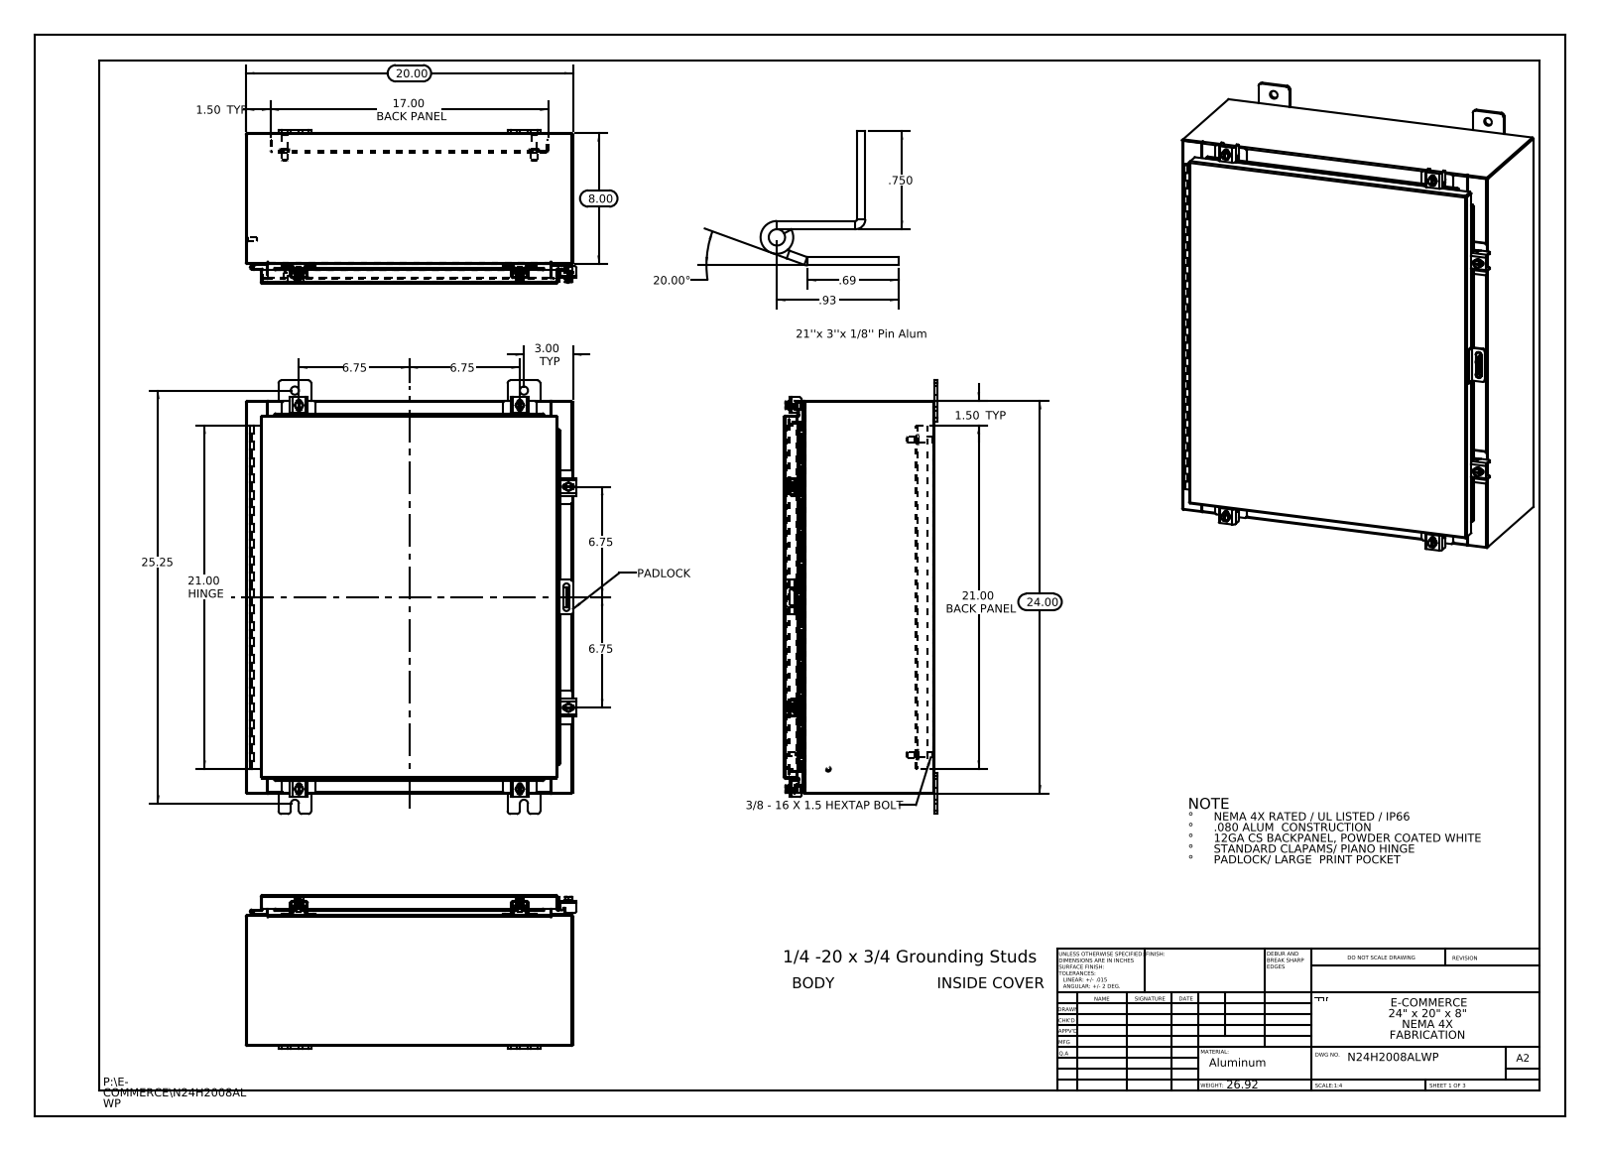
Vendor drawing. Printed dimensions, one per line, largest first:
25.25
24.00
21.00 HINGE
21.00 BACK PANEL
20.00
20.00°
17.00 BACK PANEL
8.00
6.75
6.75
6.75
6.75
3.00 TYP
1.50 TYP
1.50 TYP
.93
.750
.69
